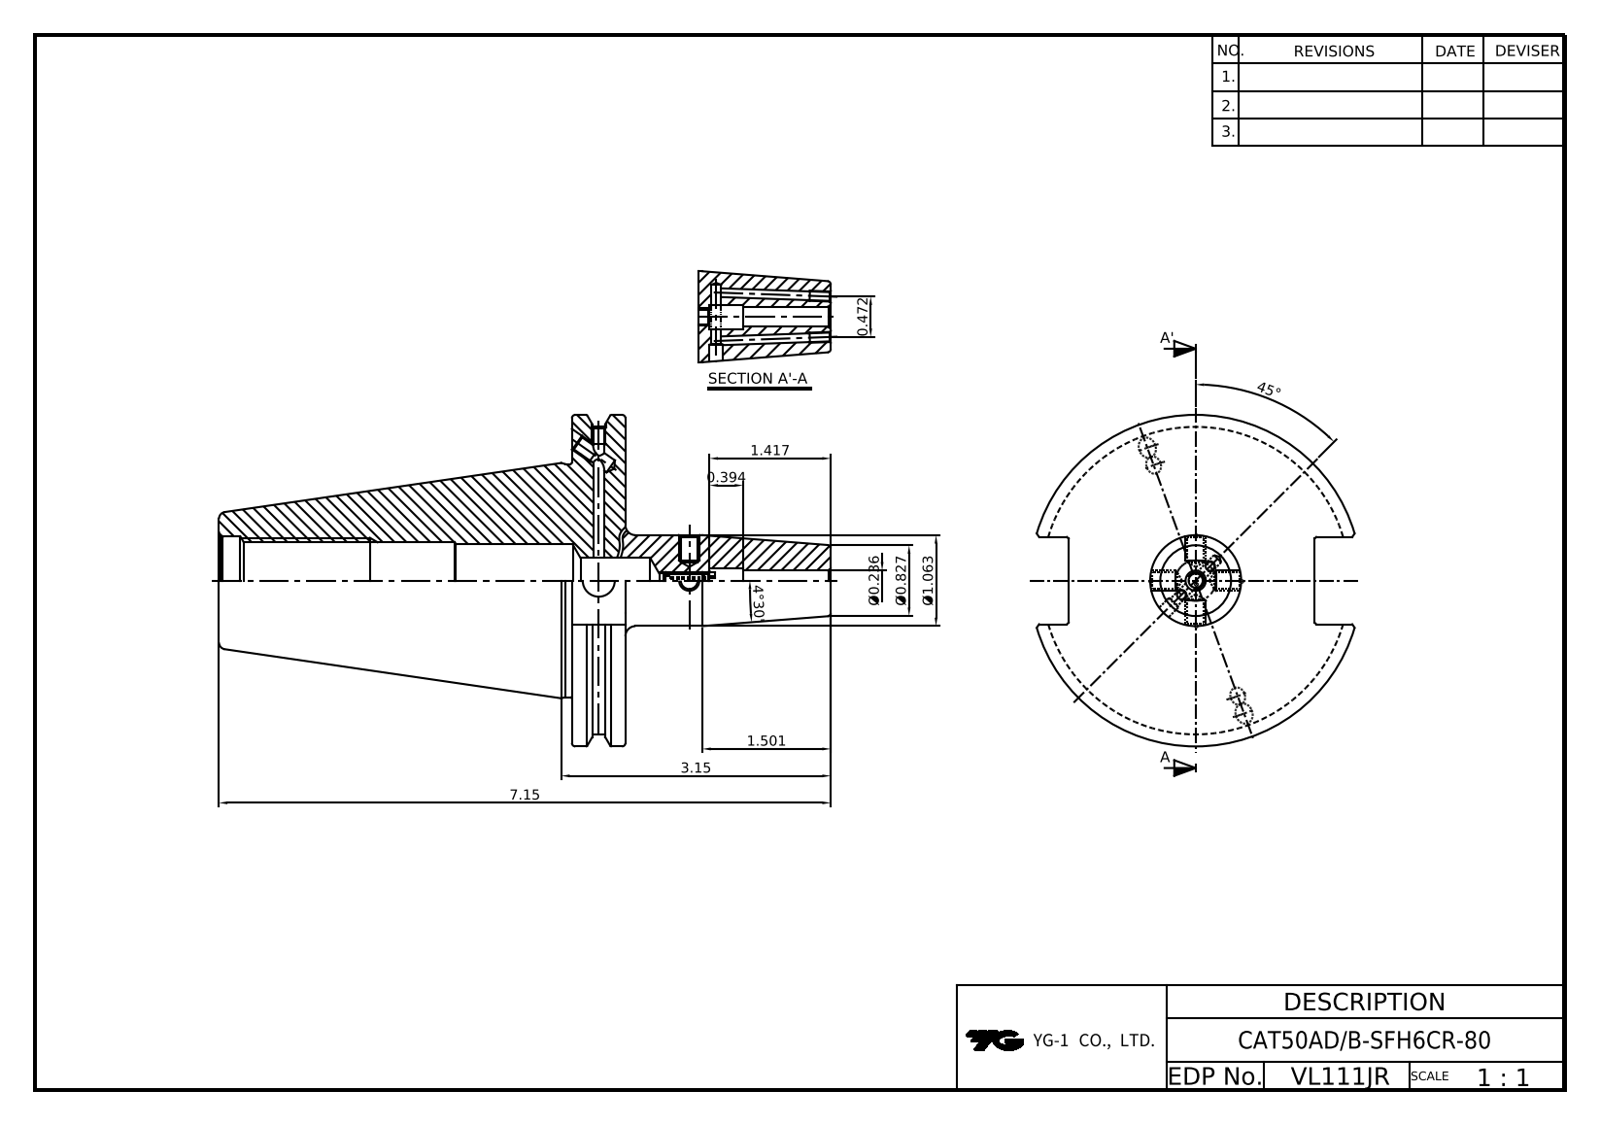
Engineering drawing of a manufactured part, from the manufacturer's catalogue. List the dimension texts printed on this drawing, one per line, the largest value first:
45°
7.15
4°30'
3.15
1.501
1.417
Ø1.063
Ø0.827
0.472
0.394
Ø0.236
